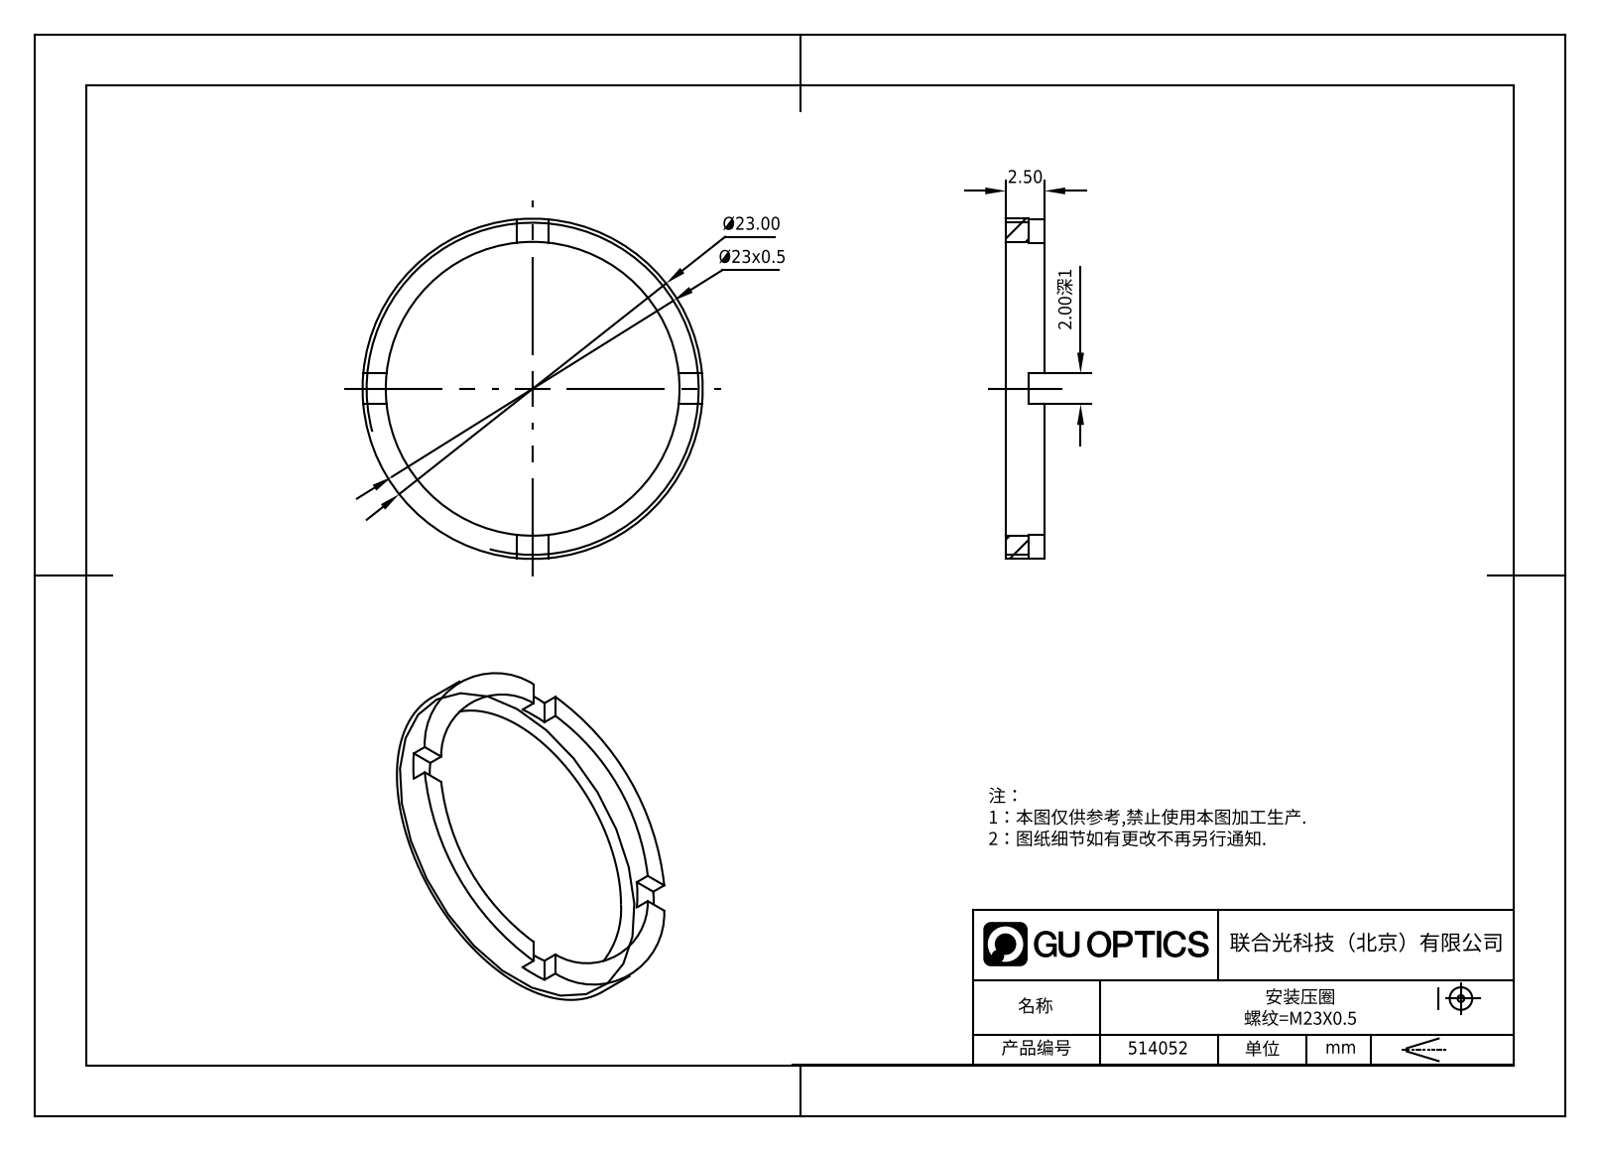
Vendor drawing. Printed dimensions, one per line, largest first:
Ø23.00
Ø23x0.5
2.50
2.00深1
